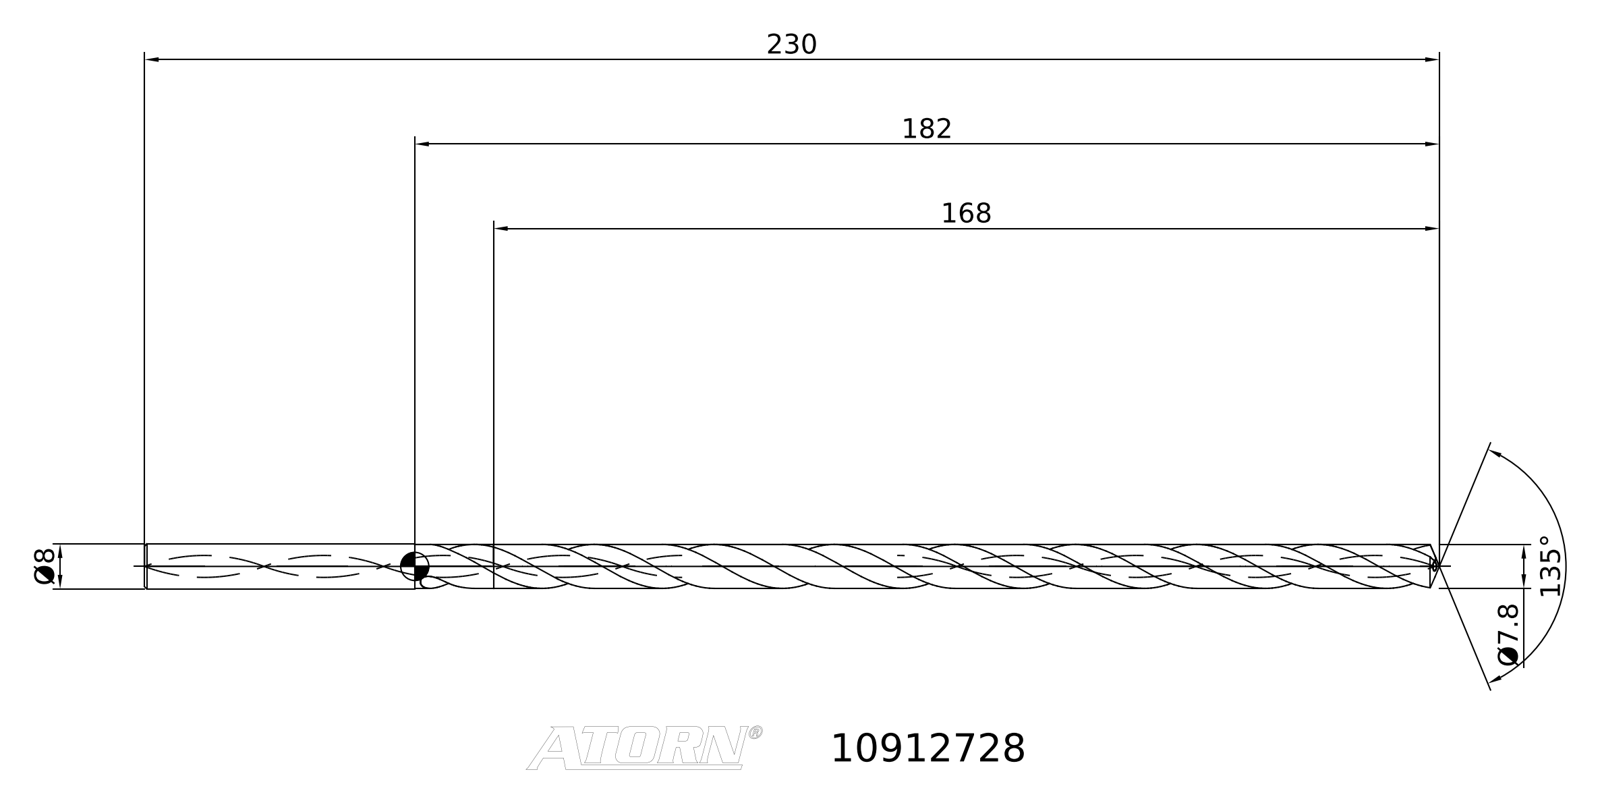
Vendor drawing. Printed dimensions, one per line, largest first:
230
182
168
135°
Ø8
Ø7.8
